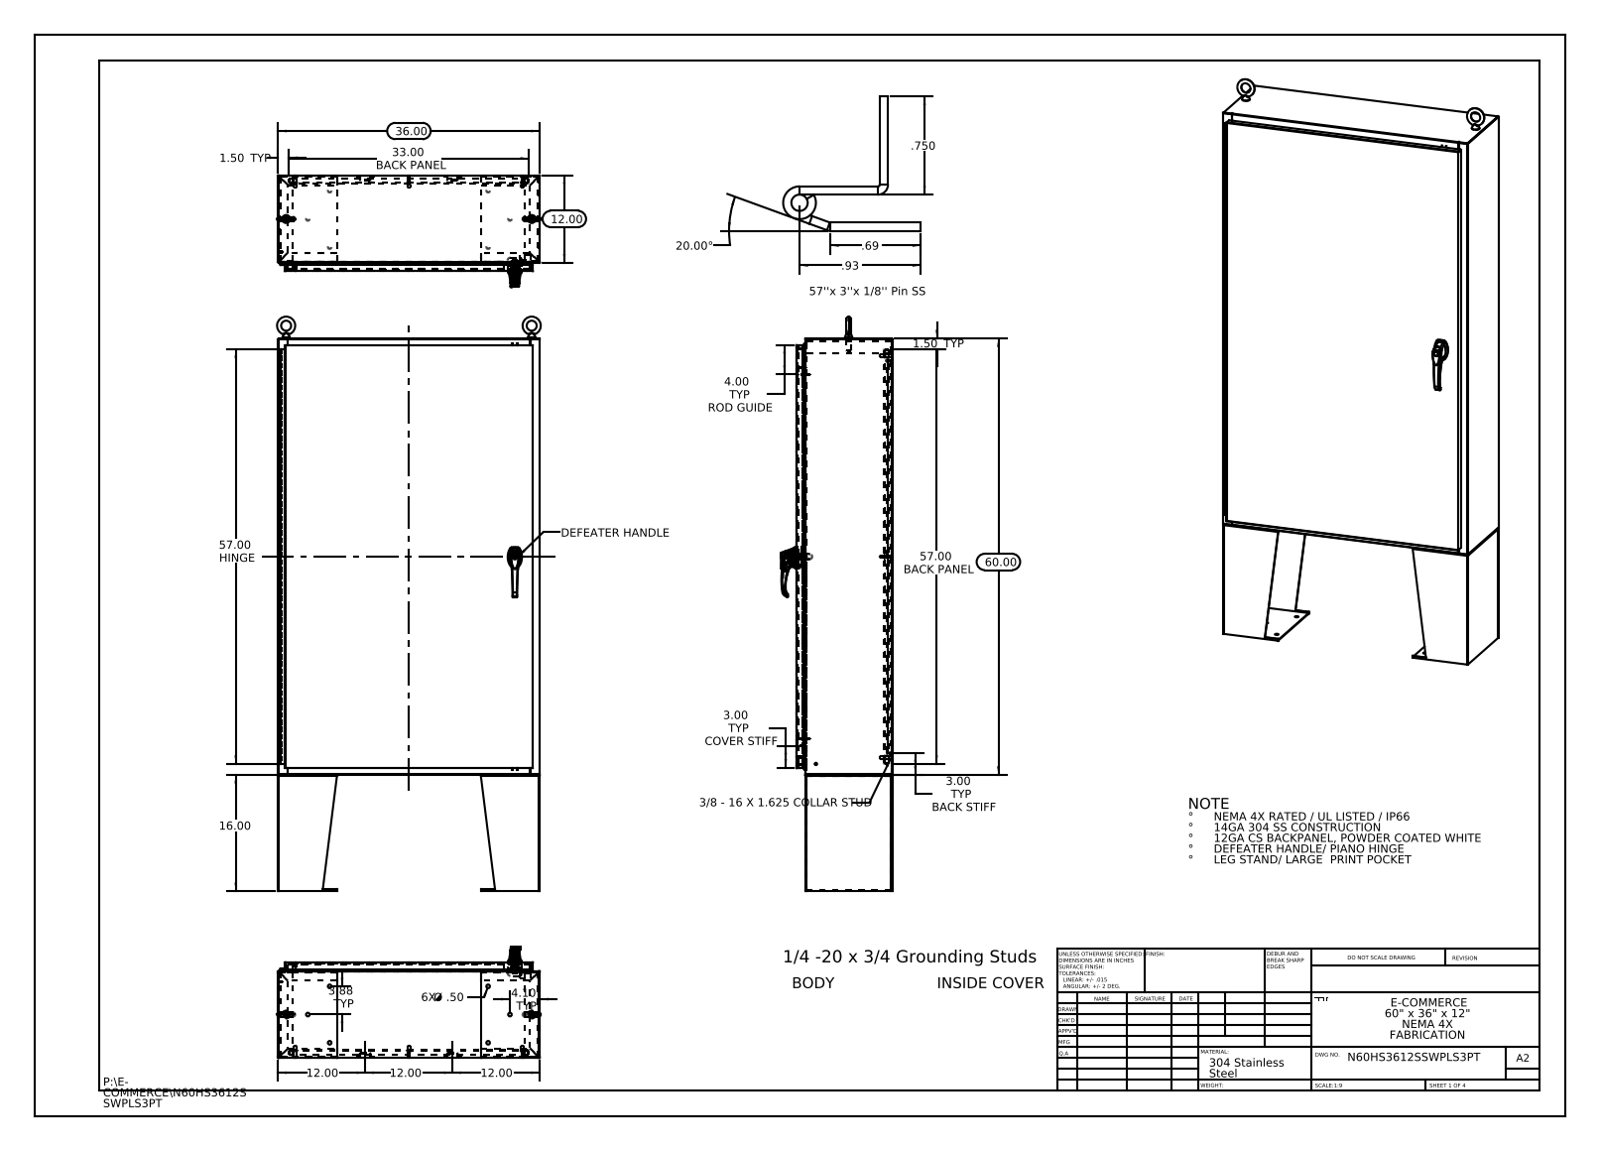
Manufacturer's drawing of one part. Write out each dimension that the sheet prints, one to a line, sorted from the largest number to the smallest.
60.00
57.00 HINGE
57.00 BACK PANEL
36.00
33.00 BACK PANEL
20.00°
16.00
12.00
12.00
12.00
12.00
4.10 TYP
4.00 TYP ROD GUIDE
3.88 TYP
3.00 TYP COVER STIFF
3.00 TYP BACK STIFF
1.50 TYP
1.50 TYP
.93
.750
.69
6X Ø .50
